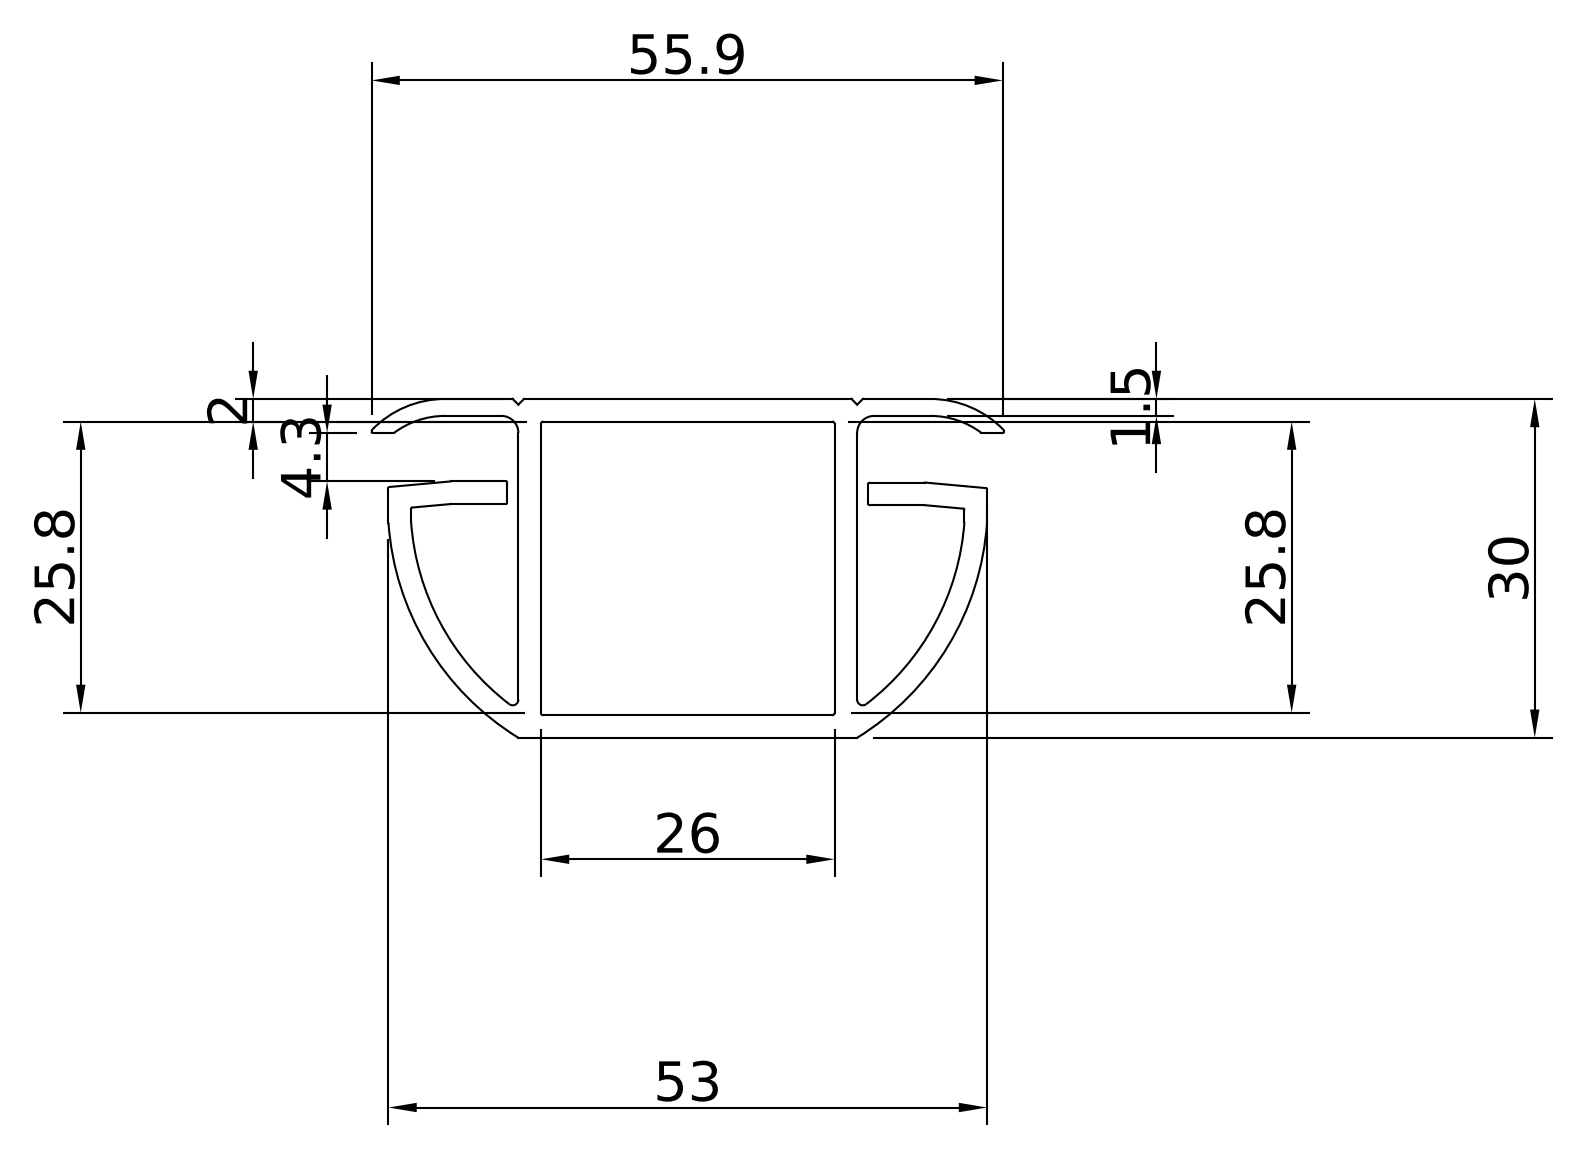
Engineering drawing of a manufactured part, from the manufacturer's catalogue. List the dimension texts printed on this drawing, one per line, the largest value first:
55.9
53
30
26
25.8
25.8
4.3
2
1.5
